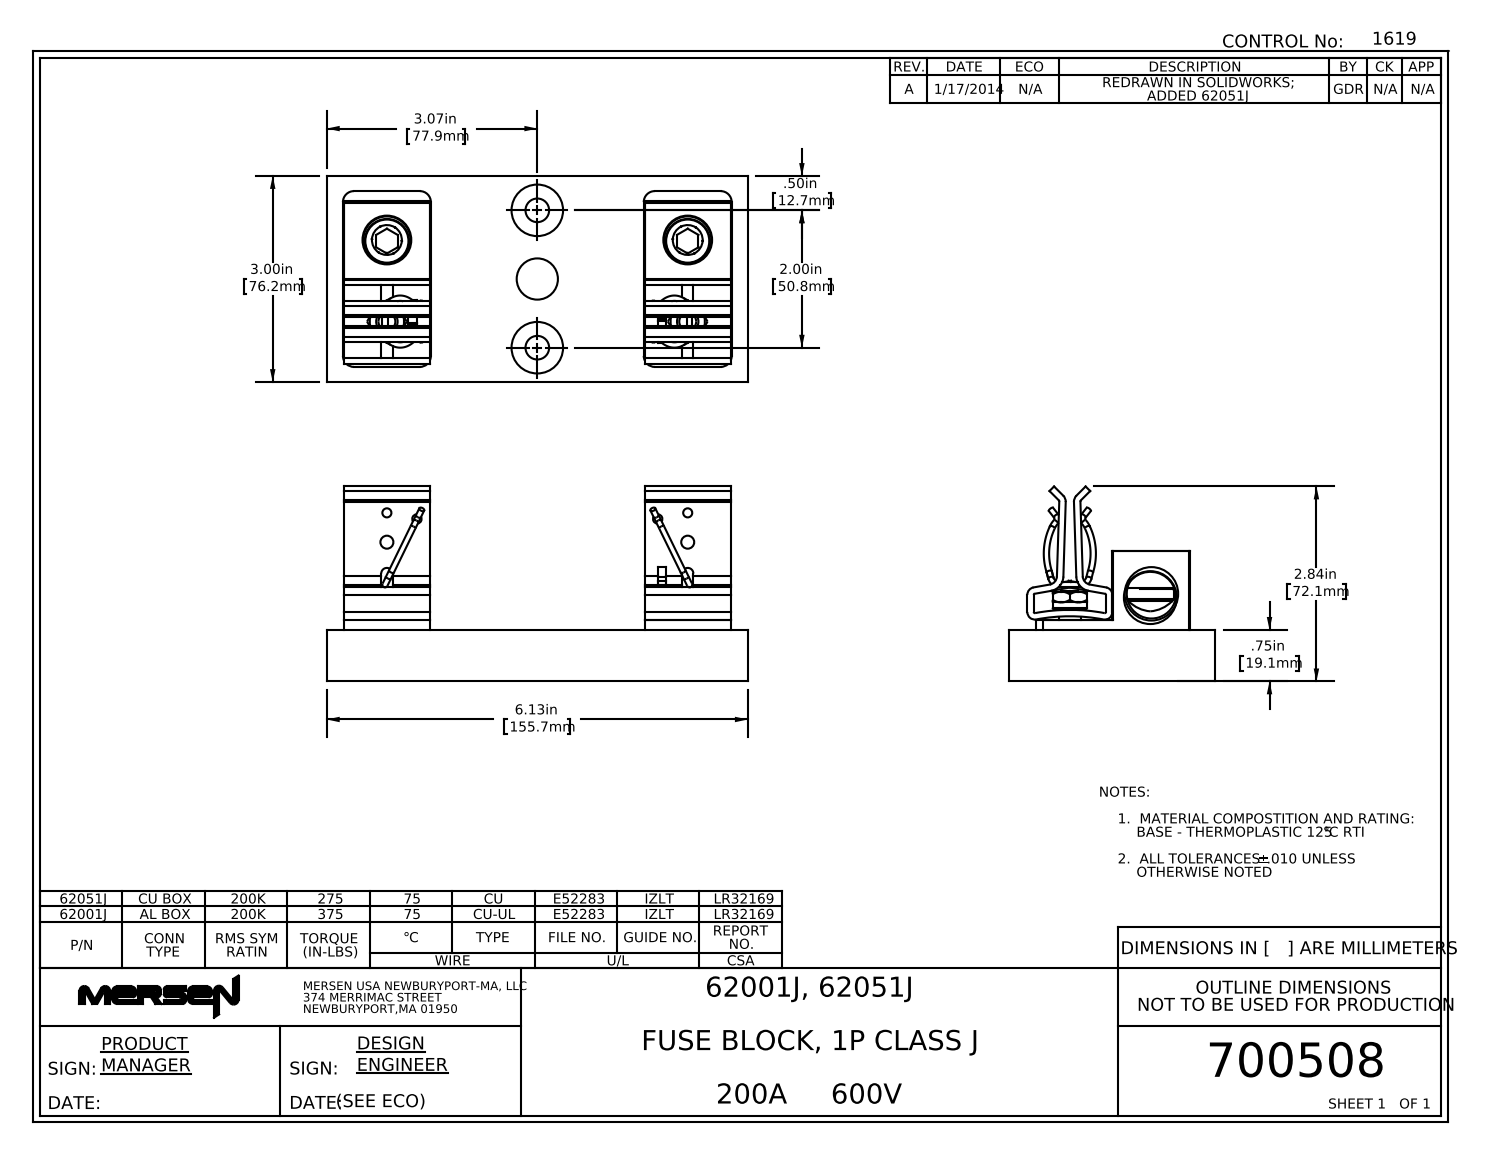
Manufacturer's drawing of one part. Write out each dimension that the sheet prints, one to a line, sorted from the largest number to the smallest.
6.13in 155.7mm
3.07in 77.9mm
3.00in 76.2mm
2.84in 72.1mm
2.00in 50.8mm
.75in 19.1mm
.50in 12.7mm
